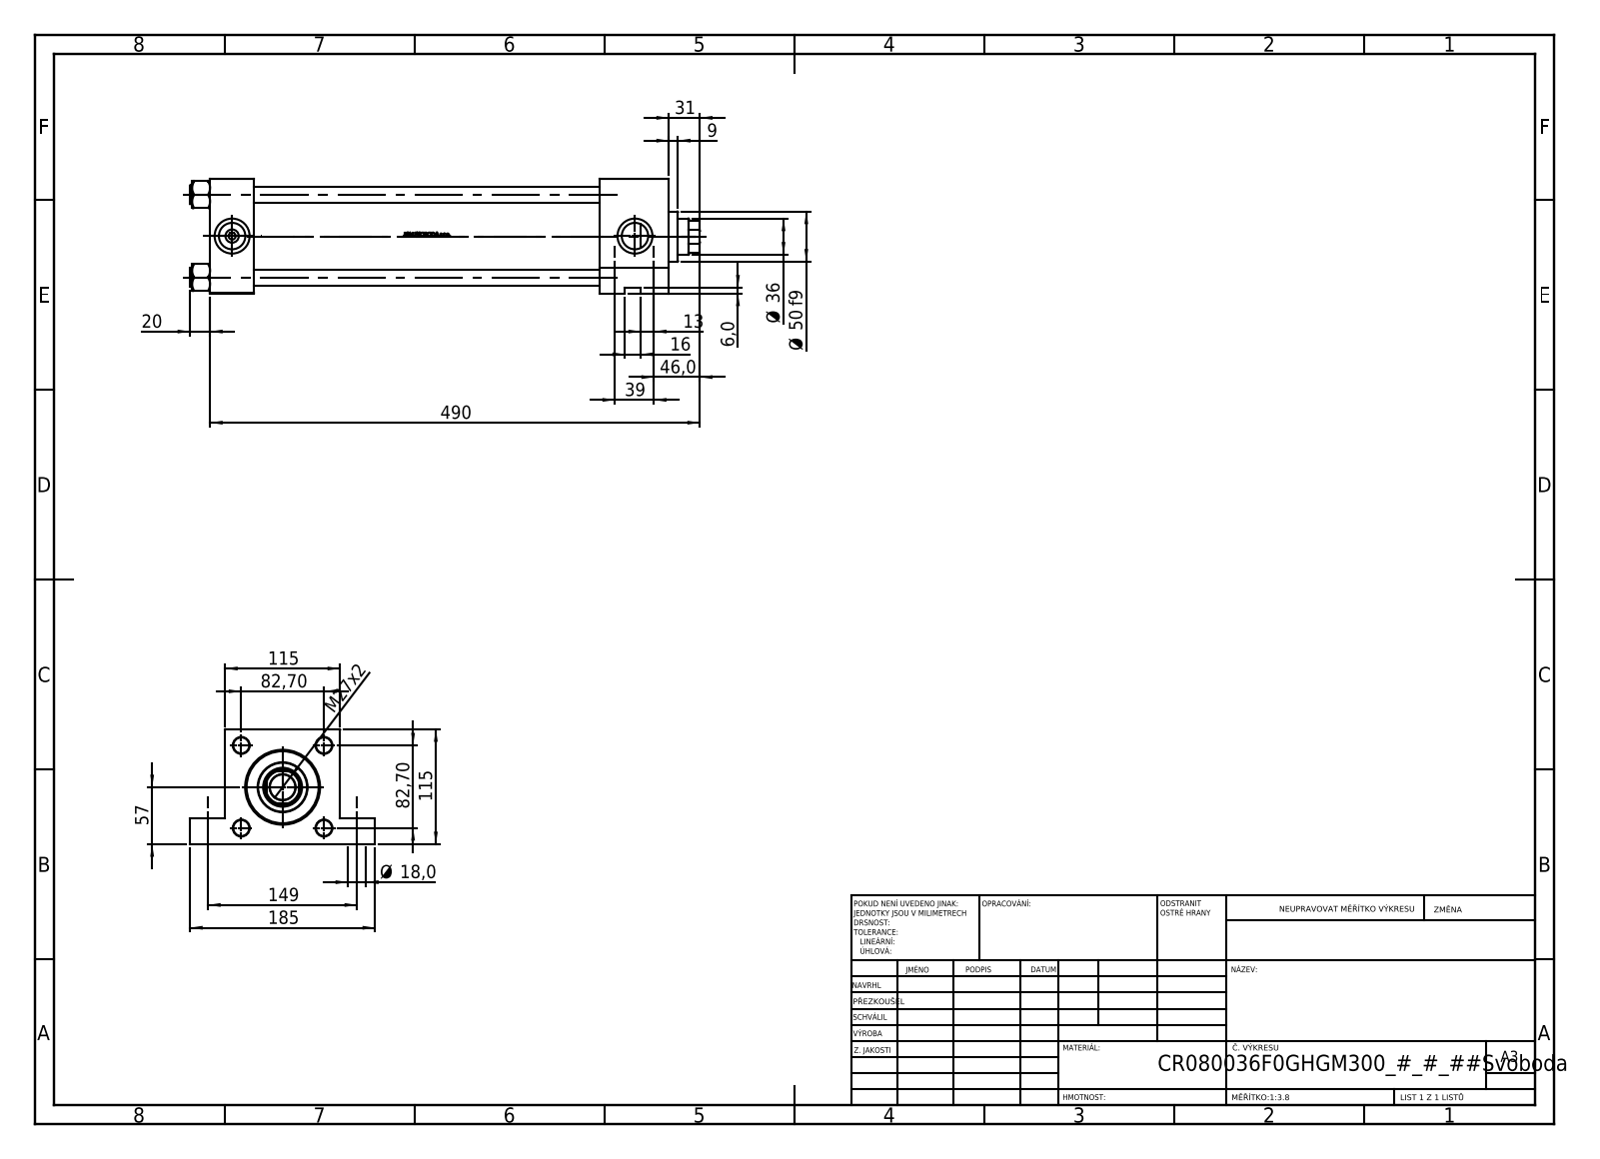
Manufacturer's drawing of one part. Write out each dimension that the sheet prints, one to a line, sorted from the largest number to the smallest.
490
185
149
115
115
82,70
82,70
57
Ø 50 f9
46,0
39
Ø 36
31
M27x2
20
Ø 18,0
16
13
9
6,0
